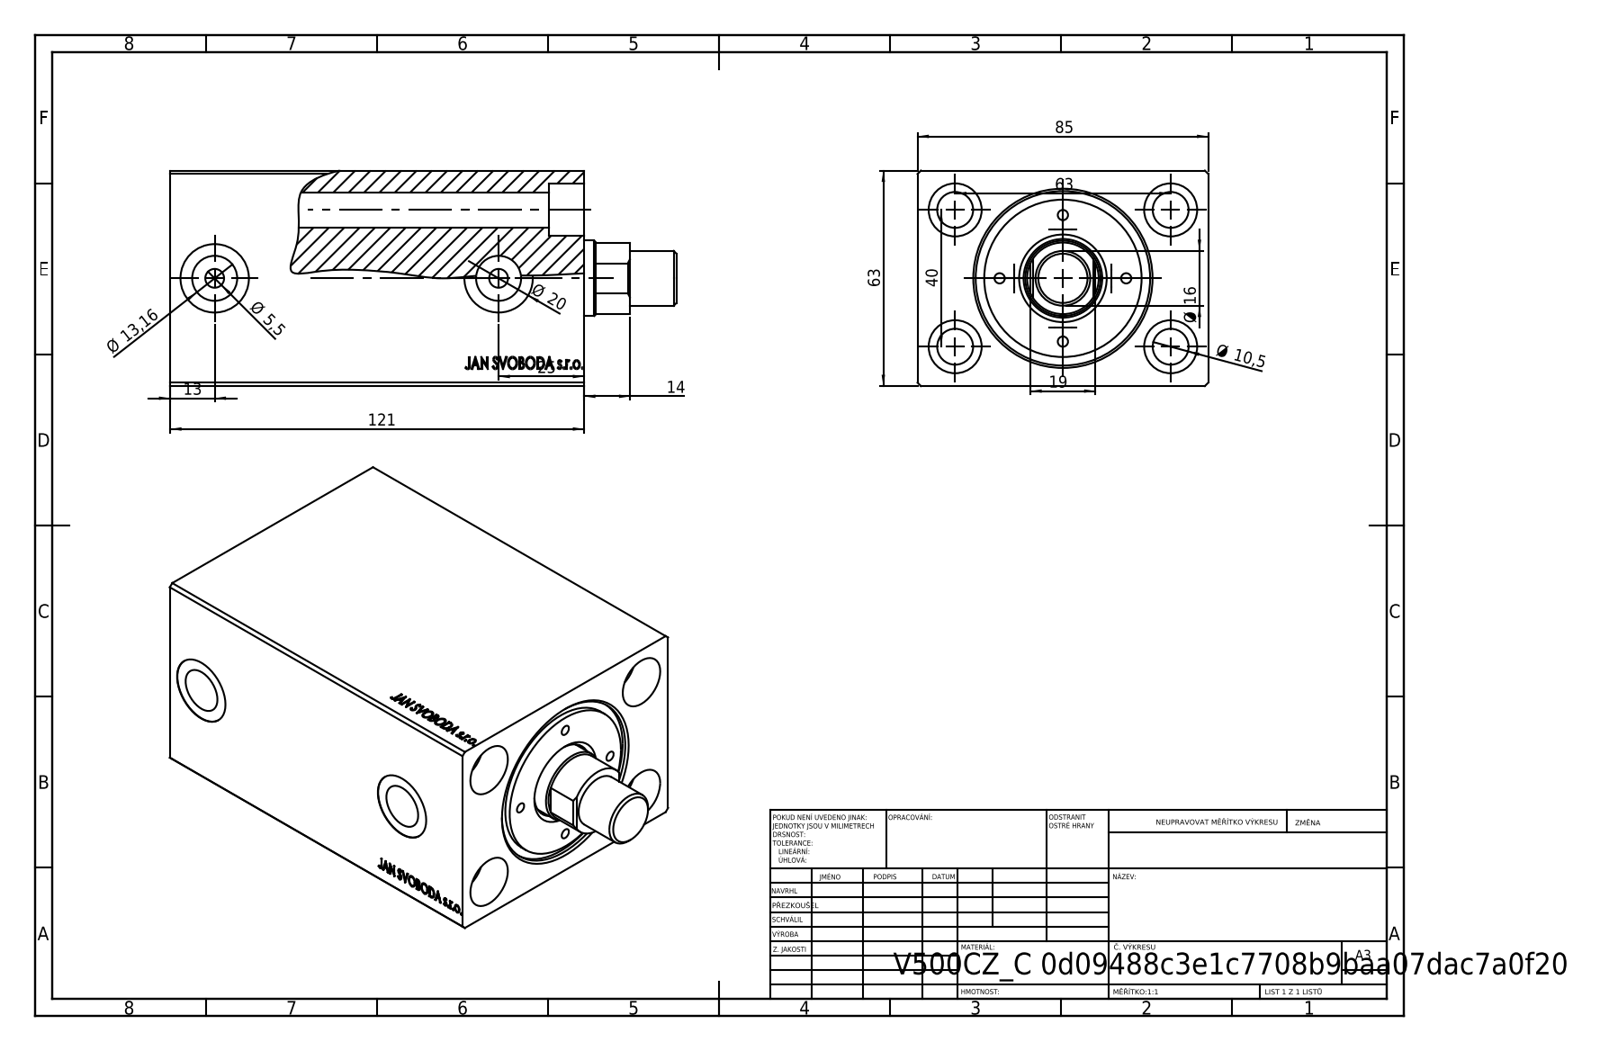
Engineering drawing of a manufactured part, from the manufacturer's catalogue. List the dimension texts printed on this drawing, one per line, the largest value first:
121
85
63
63
40
25
Ø 20
19
Ø 16
14
Ø 13,16
13
Ø 10,5
Ø 5,5
